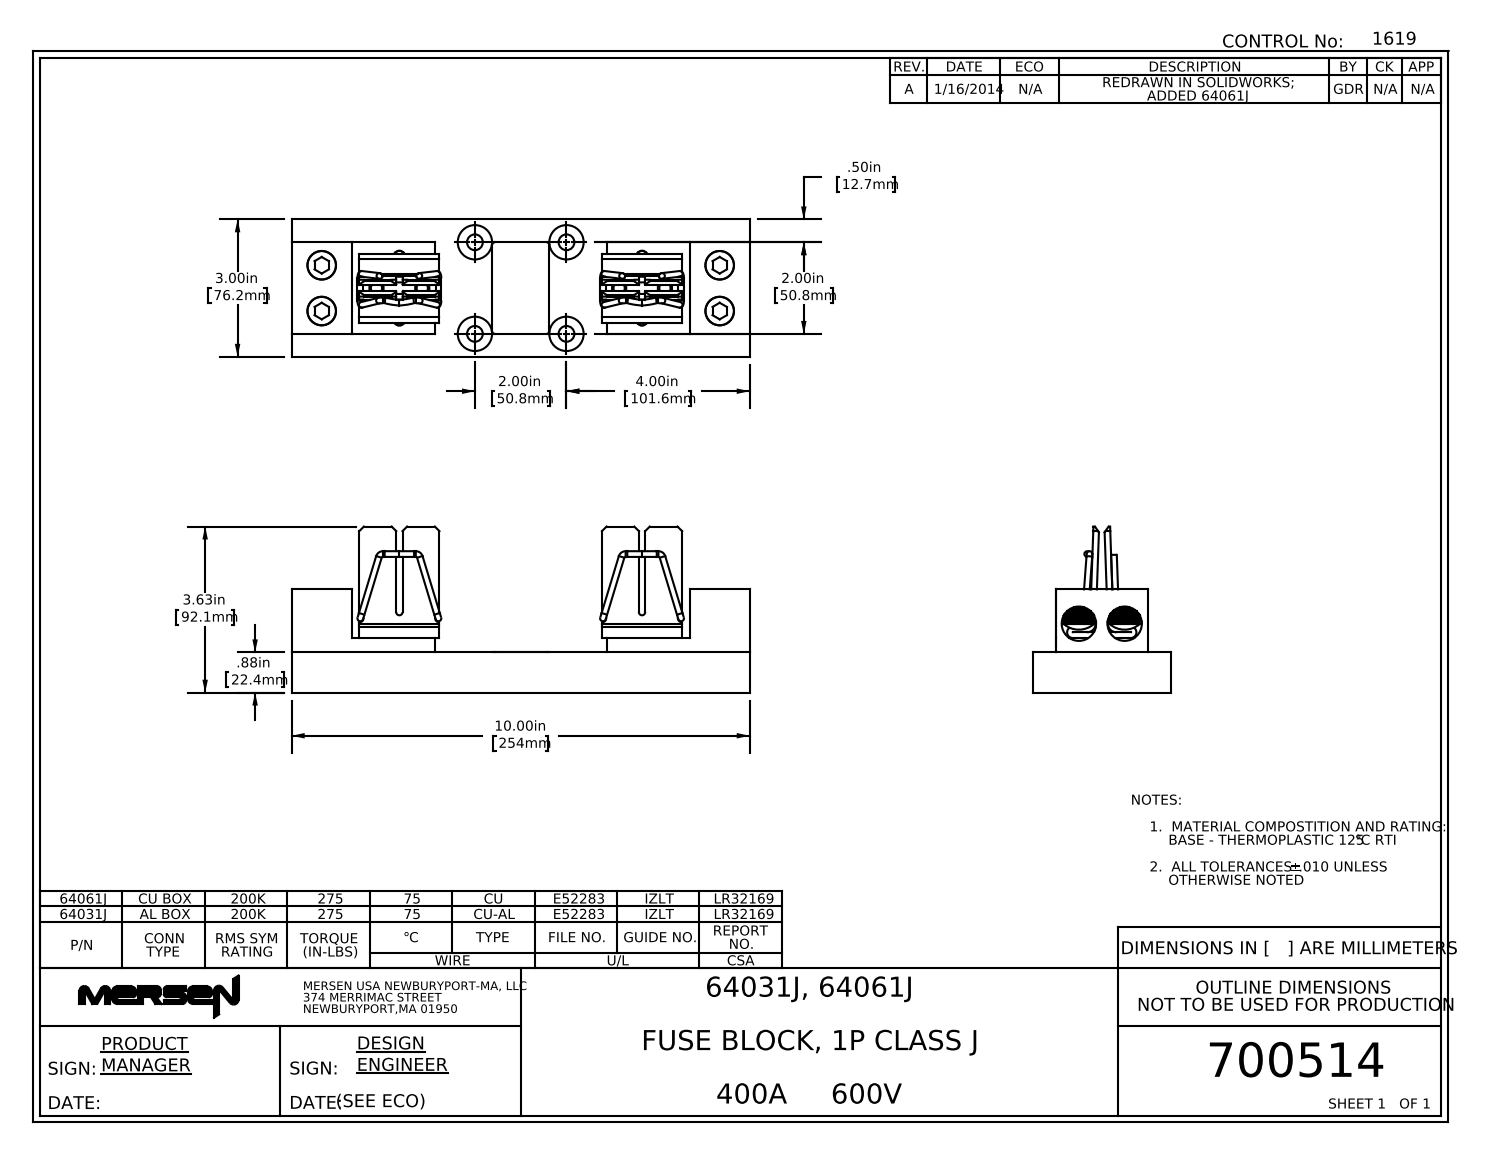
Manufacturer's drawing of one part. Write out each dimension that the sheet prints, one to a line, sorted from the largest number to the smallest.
10.00in 254mm
4.00in 101.6mm
3.63in 92.1mm
3.00in 76.2mm
2.00in 50.8mm
2.00in 50.8mm
.88in 22.4mm
.50in 12.7mm
